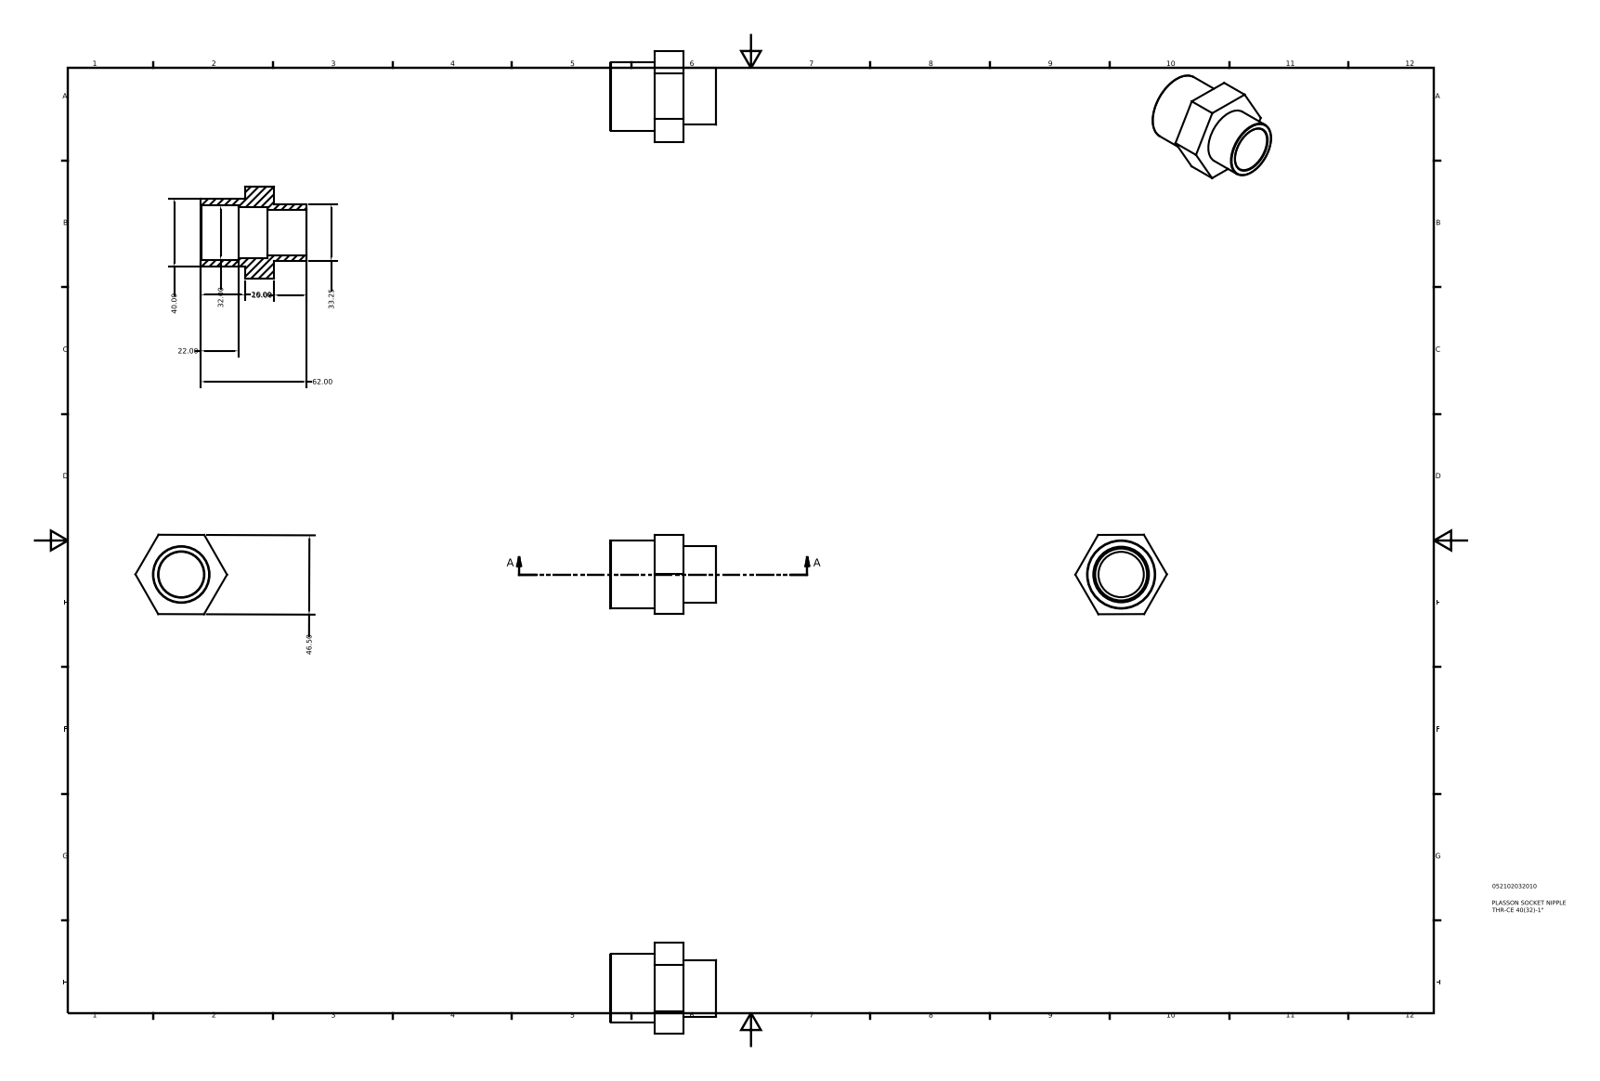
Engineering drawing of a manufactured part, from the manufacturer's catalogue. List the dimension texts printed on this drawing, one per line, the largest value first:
62.00
46.50
40.00
33.25
32.00
26.00
22.00
19.00
